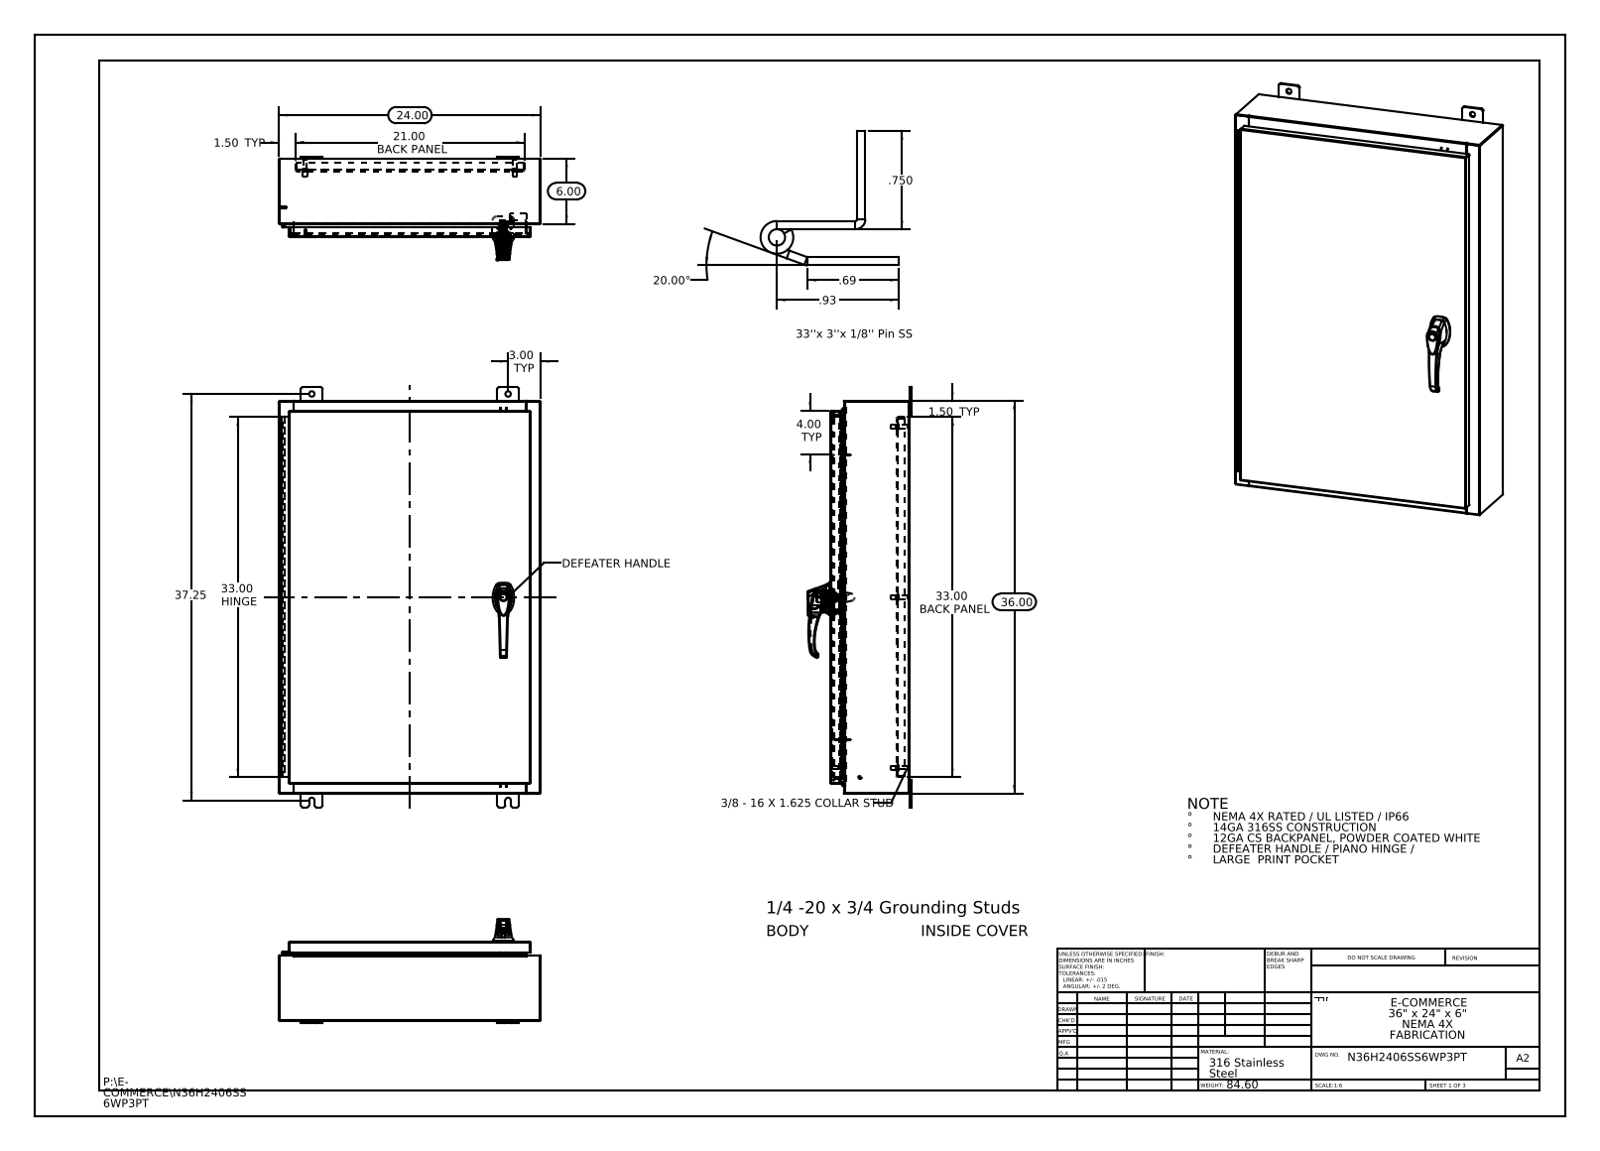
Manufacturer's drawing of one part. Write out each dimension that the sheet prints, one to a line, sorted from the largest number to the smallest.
37.25
36.00
33.00 HINGE
33.00 BACK PANEL
24.00
21.00 BACK PANEL
20.00°
6.00
4.00 TYP
3.00 TYP
1.50 TYP
1.50 TYP
.93
.750
.69
